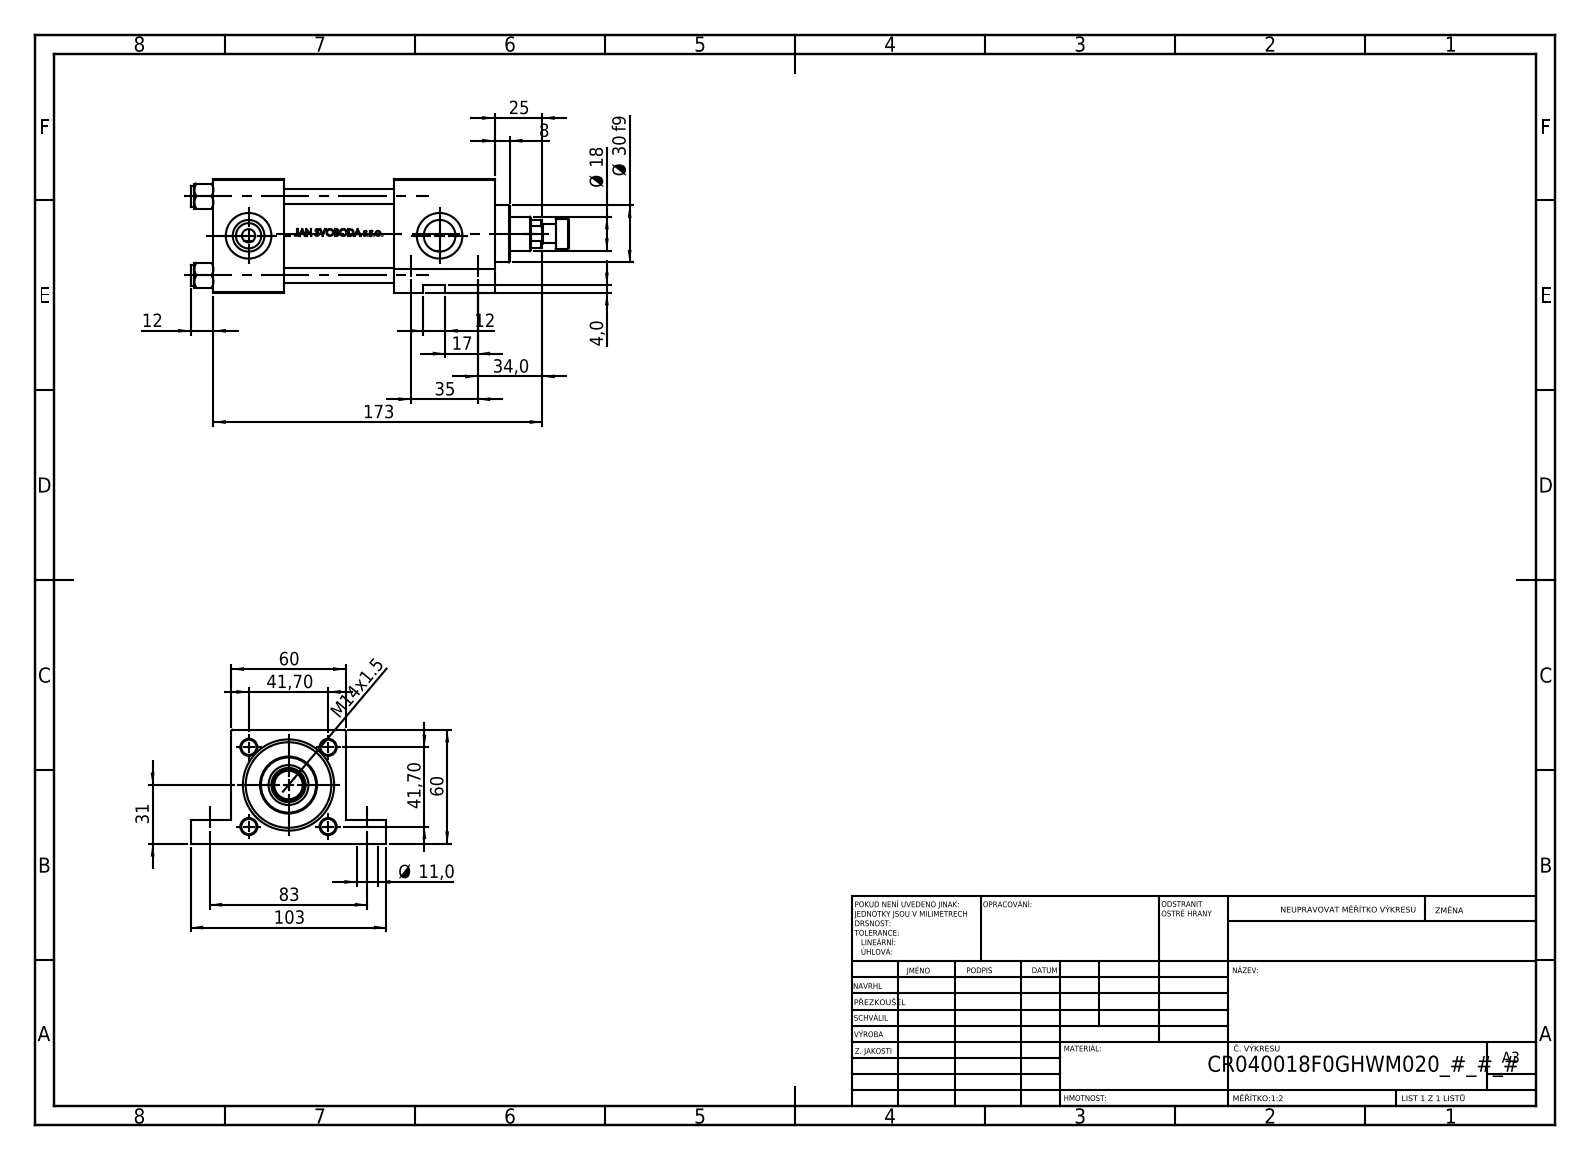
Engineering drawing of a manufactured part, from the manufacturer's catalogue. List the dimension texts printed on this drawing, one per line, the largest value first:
173
103
83
60
60
41,70
41,70
35
34,0
31
Ø 30 f9
25
Ø 18
17
M14x1.5
12
12
Ø 11,0
8
4,0
